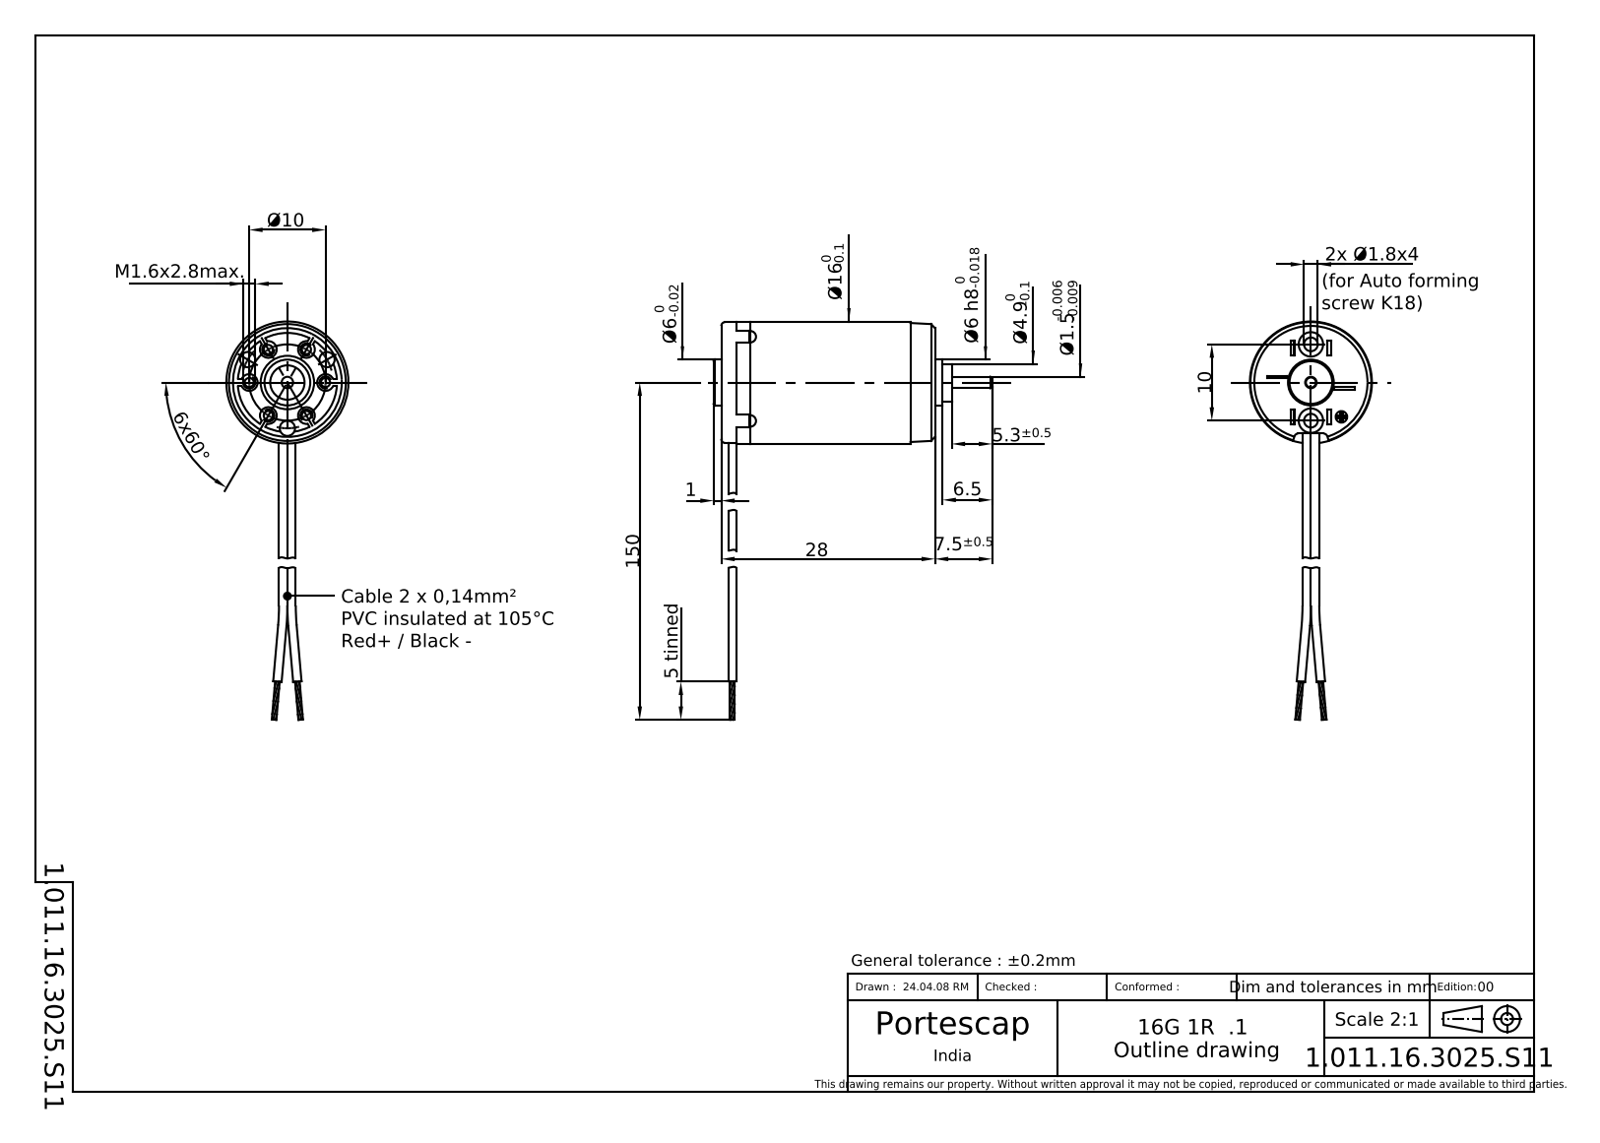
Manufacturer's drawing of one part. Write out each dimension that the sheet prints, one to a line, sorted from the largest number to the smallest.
150
6x60°
28
10
Ø10
7.5±0.5
6.5
5.3±0.5
5 tinned
2x Ø1.8x4
M1.6x2.8max.
1
